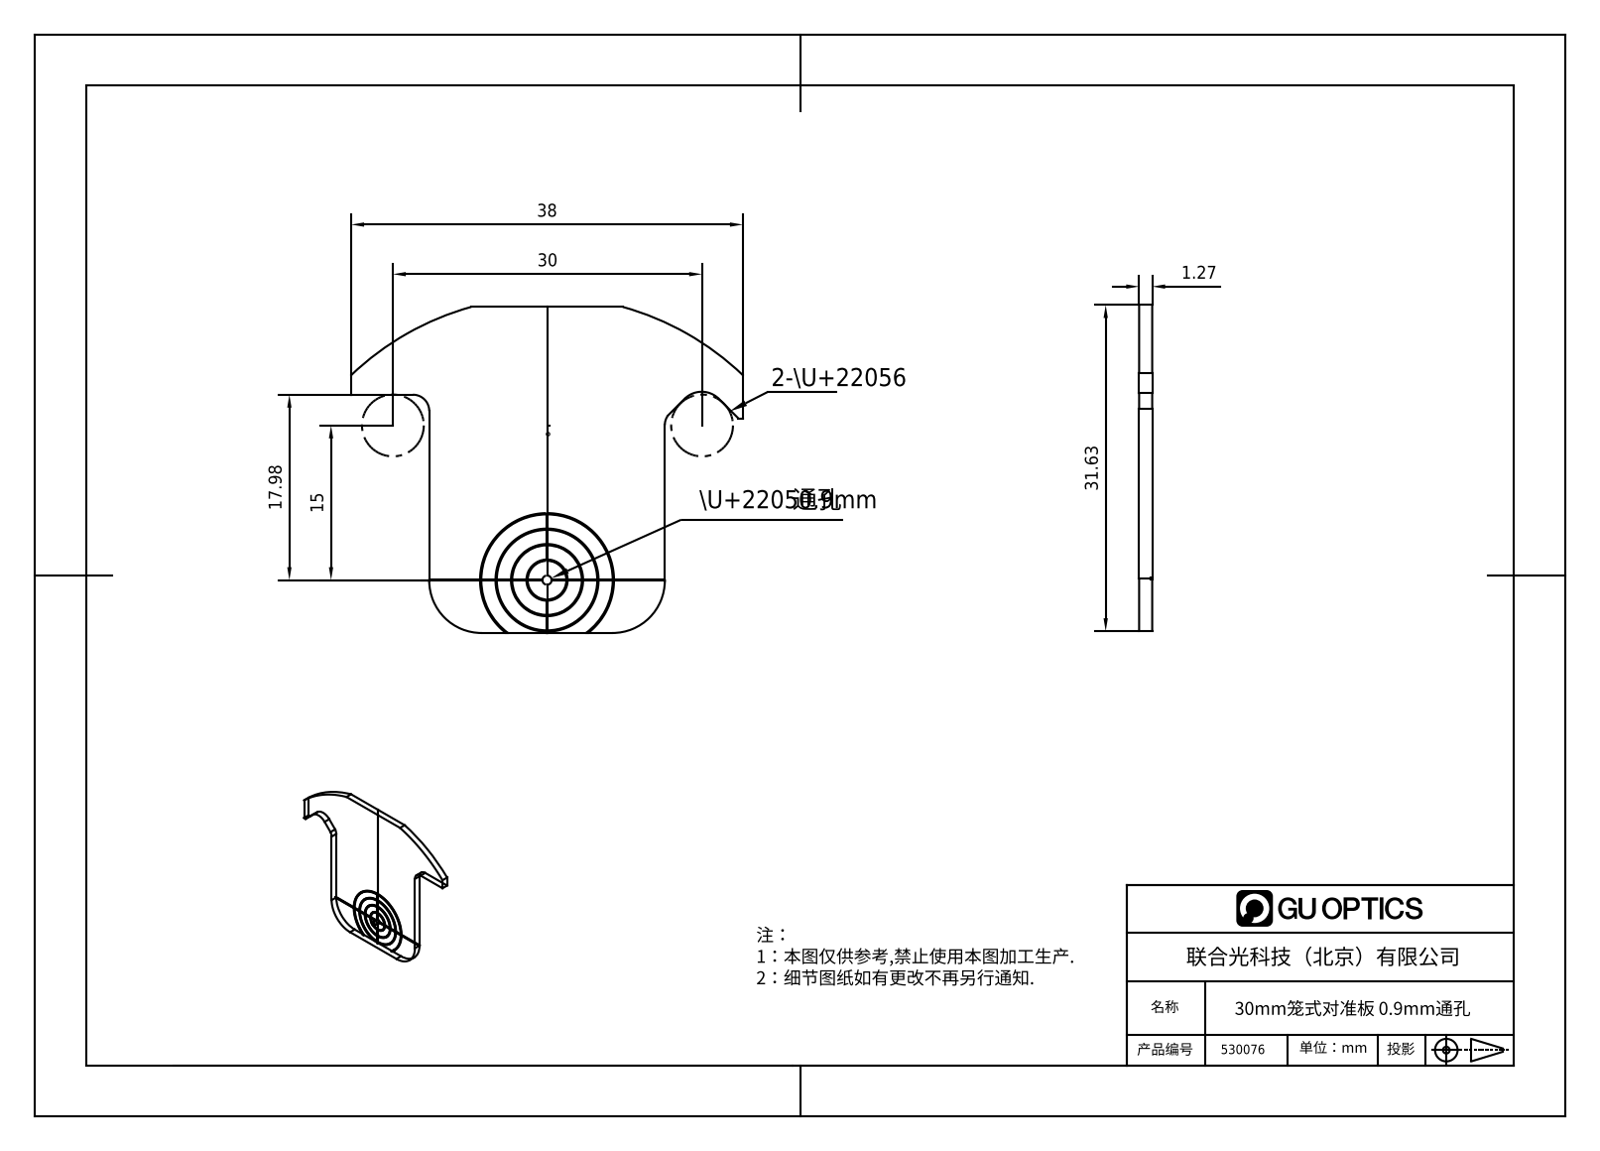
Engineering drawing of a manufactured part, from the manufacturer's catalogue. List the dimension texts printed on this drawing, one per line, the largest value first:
38
31.63
30
17.98
15
1.27
